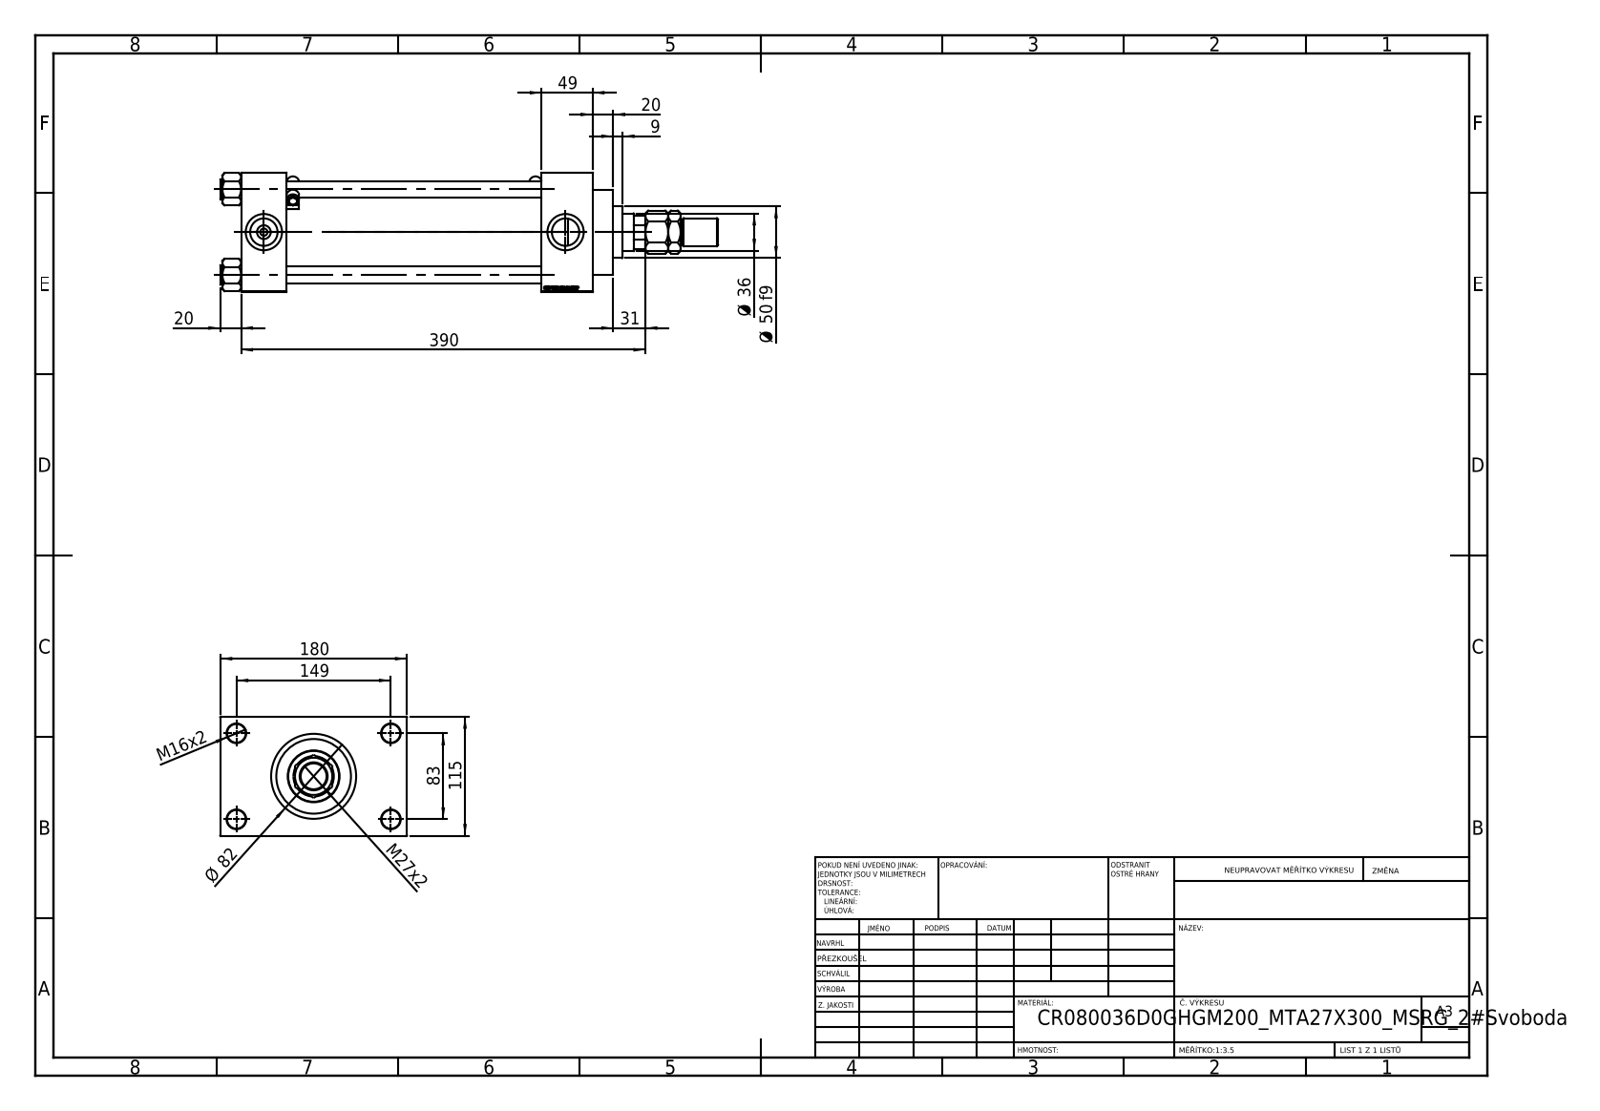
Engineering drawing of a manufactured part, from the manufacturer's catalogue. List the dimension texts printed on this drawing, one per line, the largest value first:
390
180
149
115
83
Ø 82
Ø 50 f9
49
Ø 36
31
M27x2
20
20
M16x2
9
